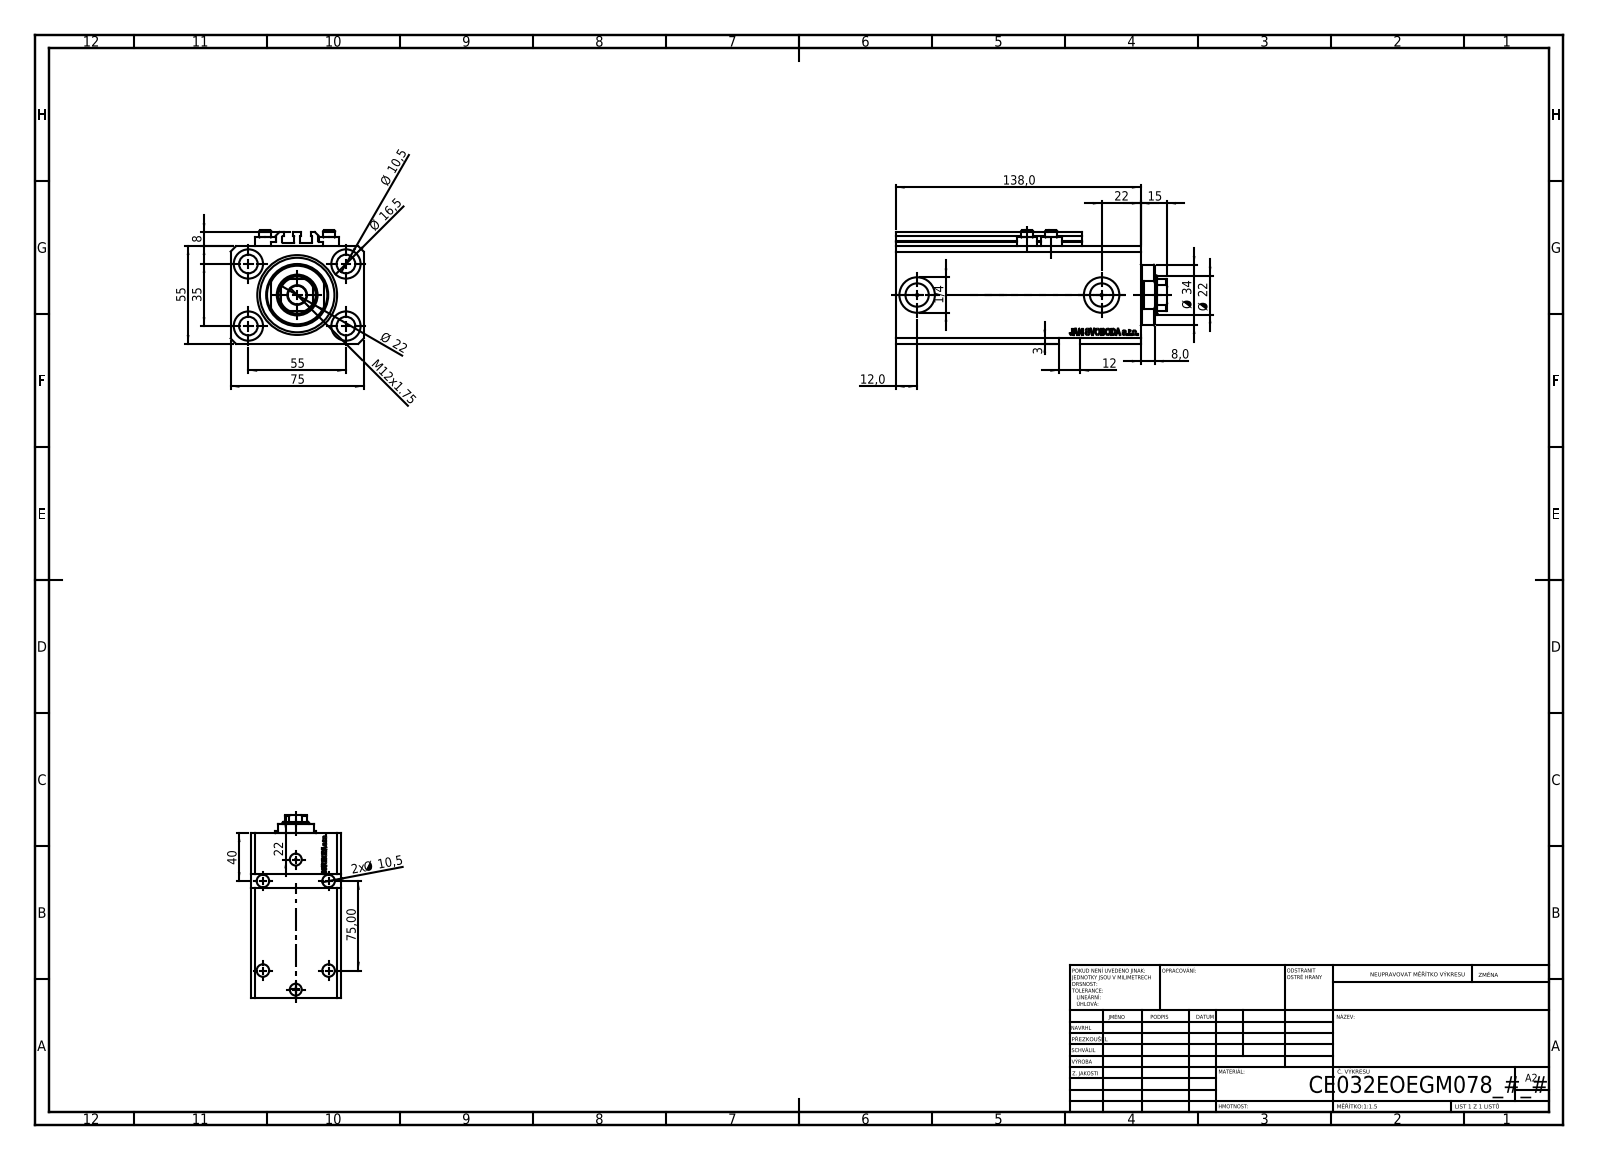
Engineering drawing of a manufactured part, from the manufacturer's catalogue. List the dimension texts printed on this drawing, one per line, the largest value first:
138,0
75
75,00
55
55
40
35
Ø 34
Ø 22
22
Ø 22
22
Ø 16,5
15
M12x1.75
12,0
12
Ø 10,5
2x Ø 10,5
8
8,0
3
1/4
